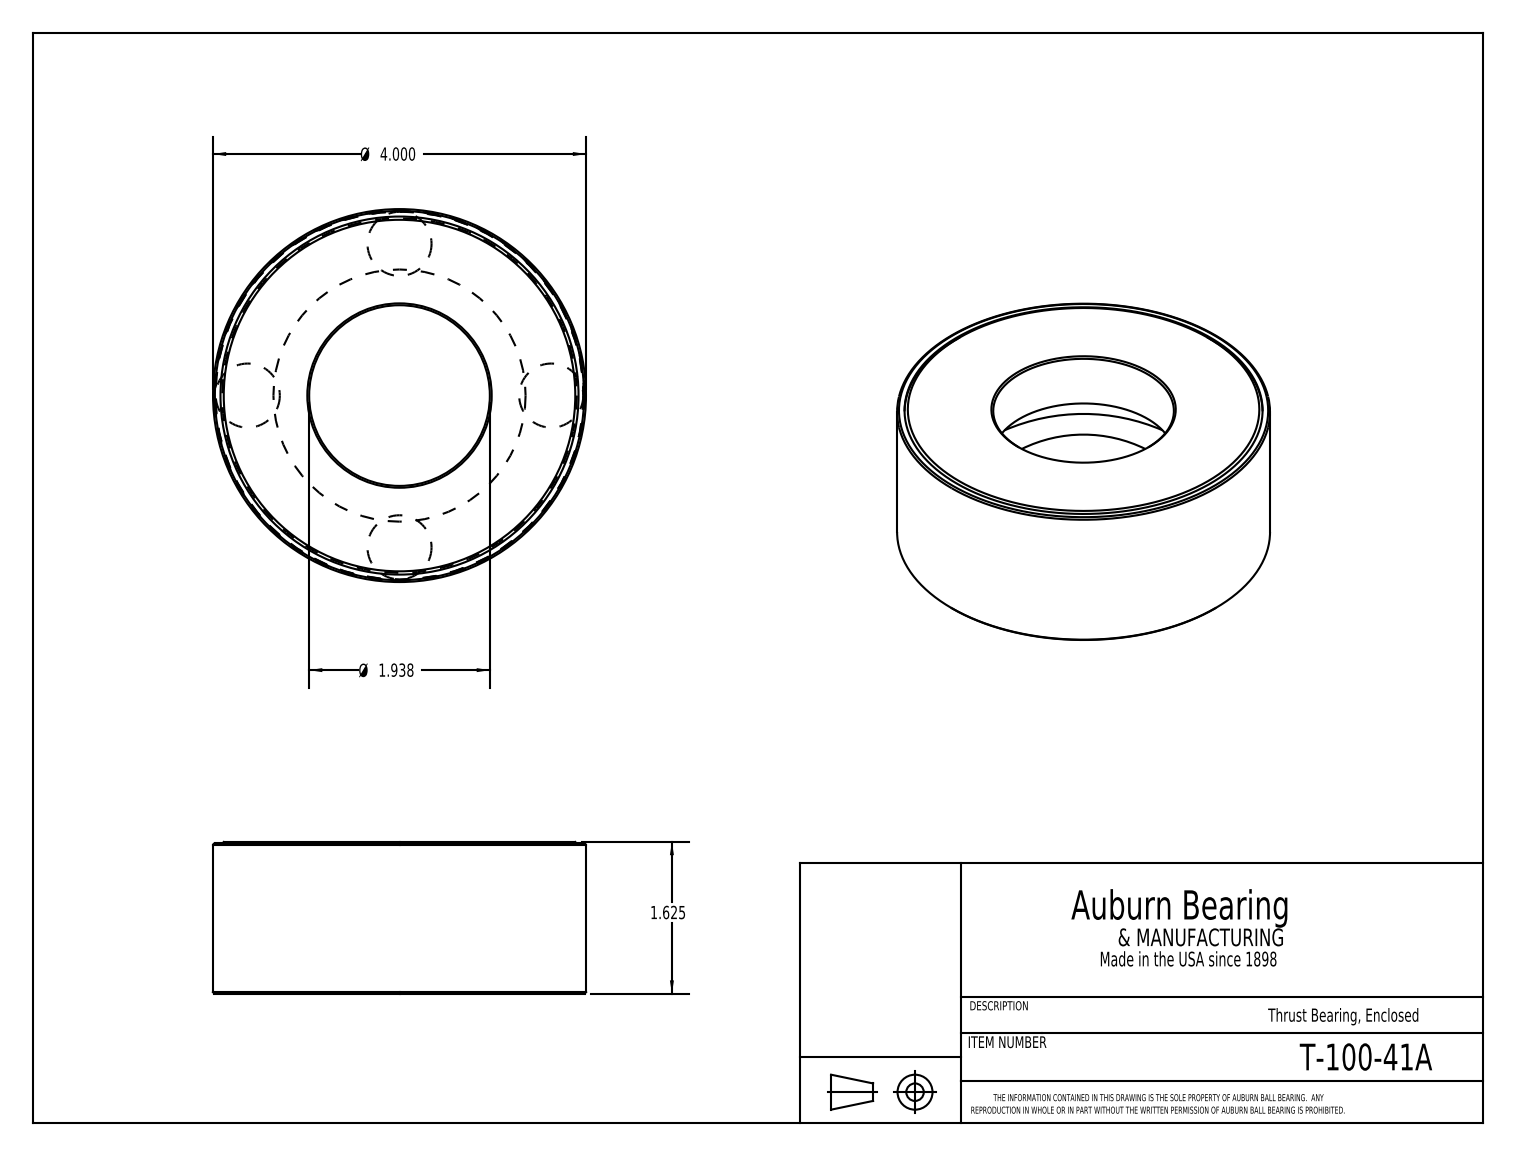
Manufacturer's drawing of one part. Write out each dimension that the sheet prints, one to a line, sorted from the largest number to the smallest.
Ø 4.000
Ø 1.938
1.625
